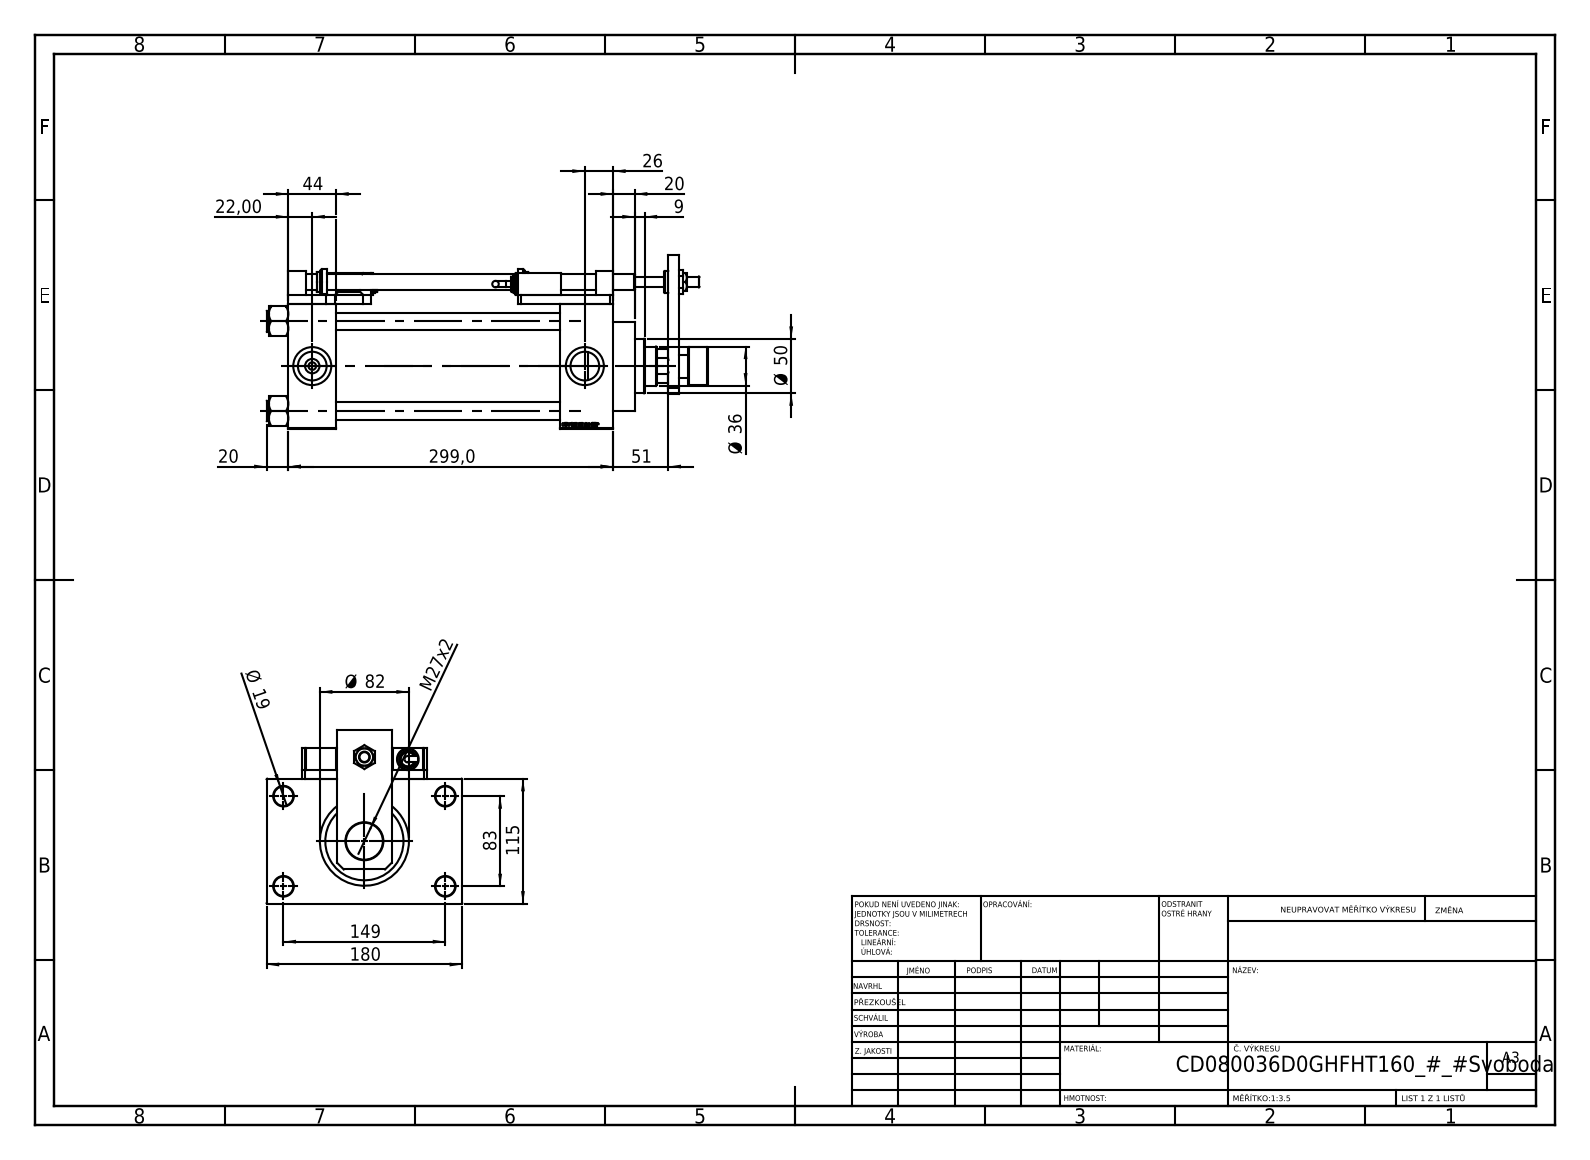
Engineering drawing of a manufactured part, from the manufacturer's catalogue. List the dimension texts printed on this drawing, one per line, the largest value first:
299,0
180
149
115
83
Ø 82
51
Ø 50
44
Ø 36
M27x2
26
22,00
20
20
Ø 19
9
